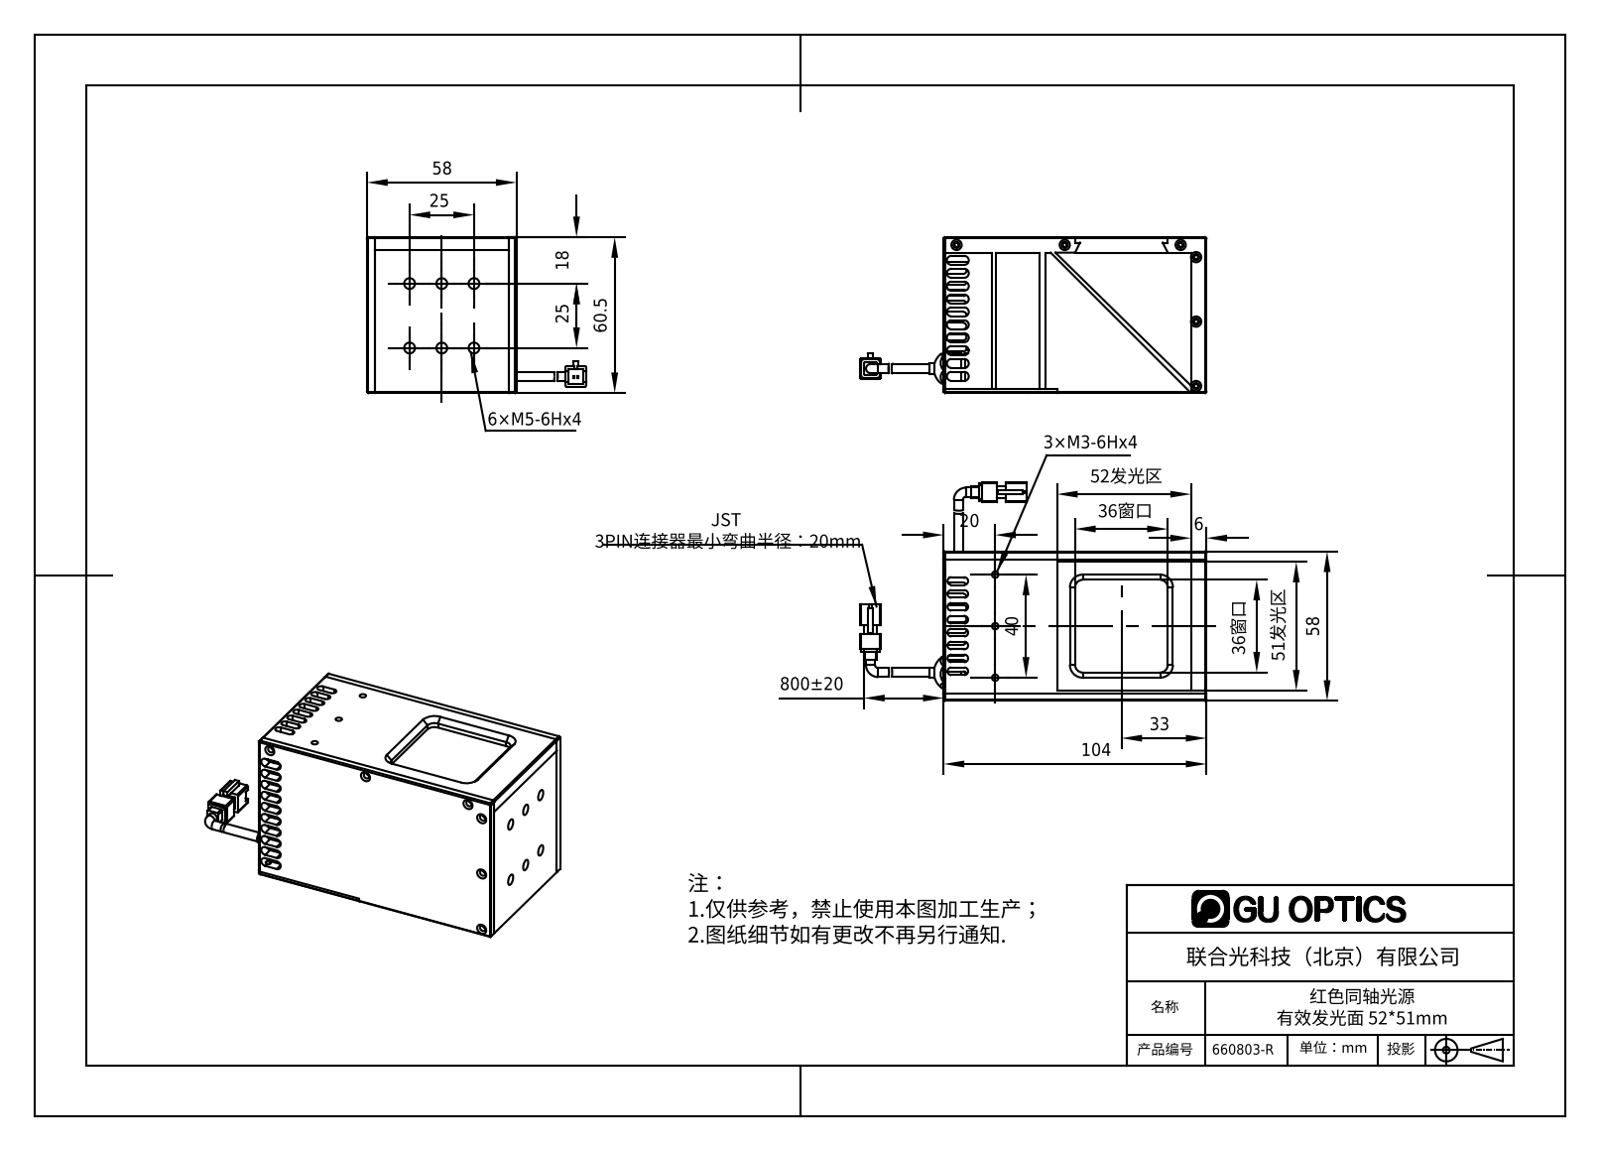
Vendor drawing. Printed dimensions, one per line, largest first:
800±20
104
60.5
58
58
52发光区
51发光区
40
36窗口
36窗口
33
25
25
20
18
6
